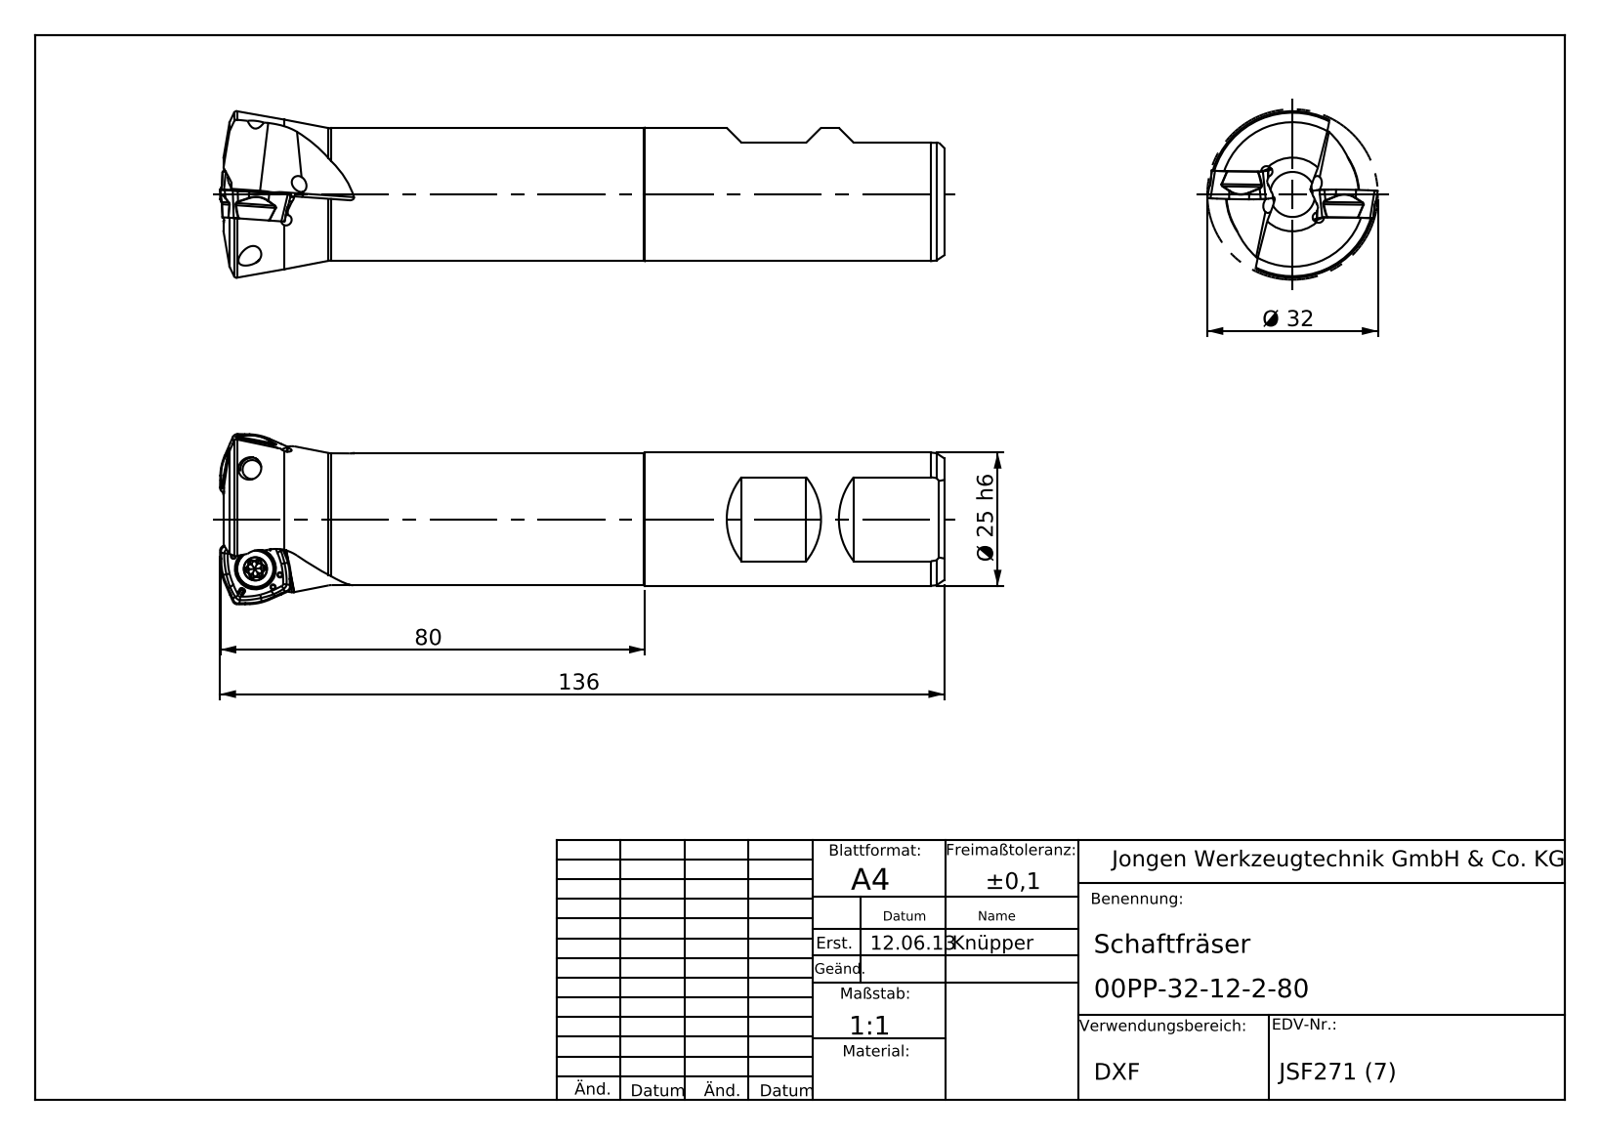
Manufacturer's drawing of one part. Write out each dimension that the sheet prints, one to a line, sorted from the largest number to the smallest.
136
80
Ø 32
Ø 25 h6
